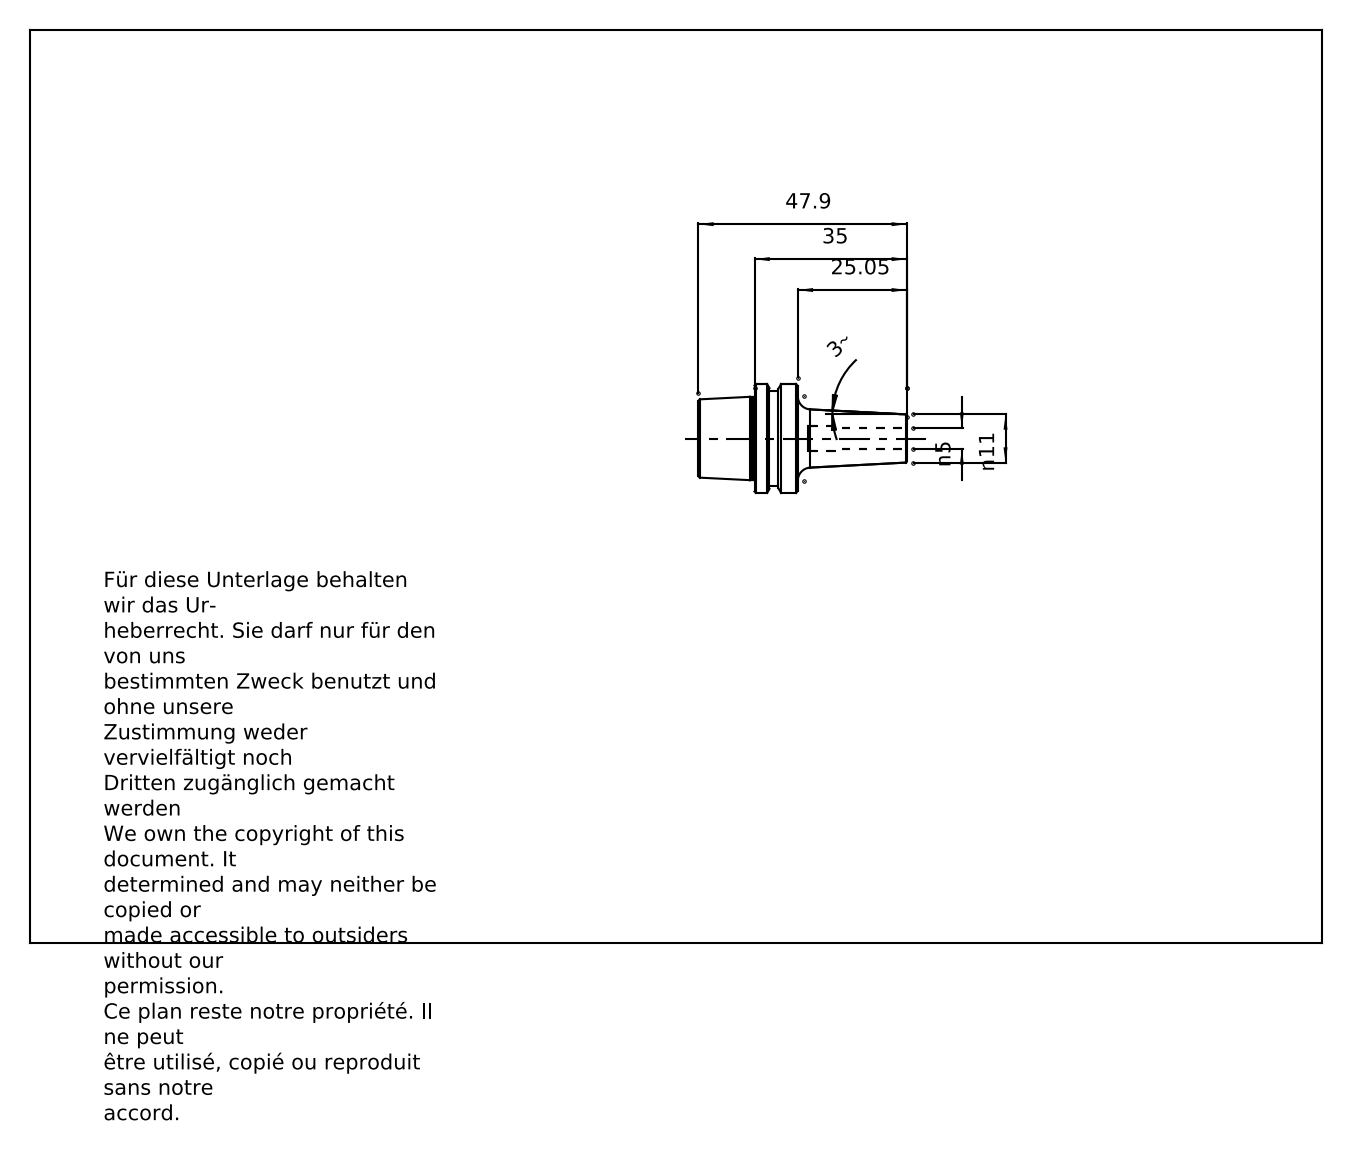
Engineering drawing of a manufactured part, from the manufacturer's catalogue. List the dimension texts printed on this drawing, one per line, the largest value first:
47.9
35
25.05
n11
n5
